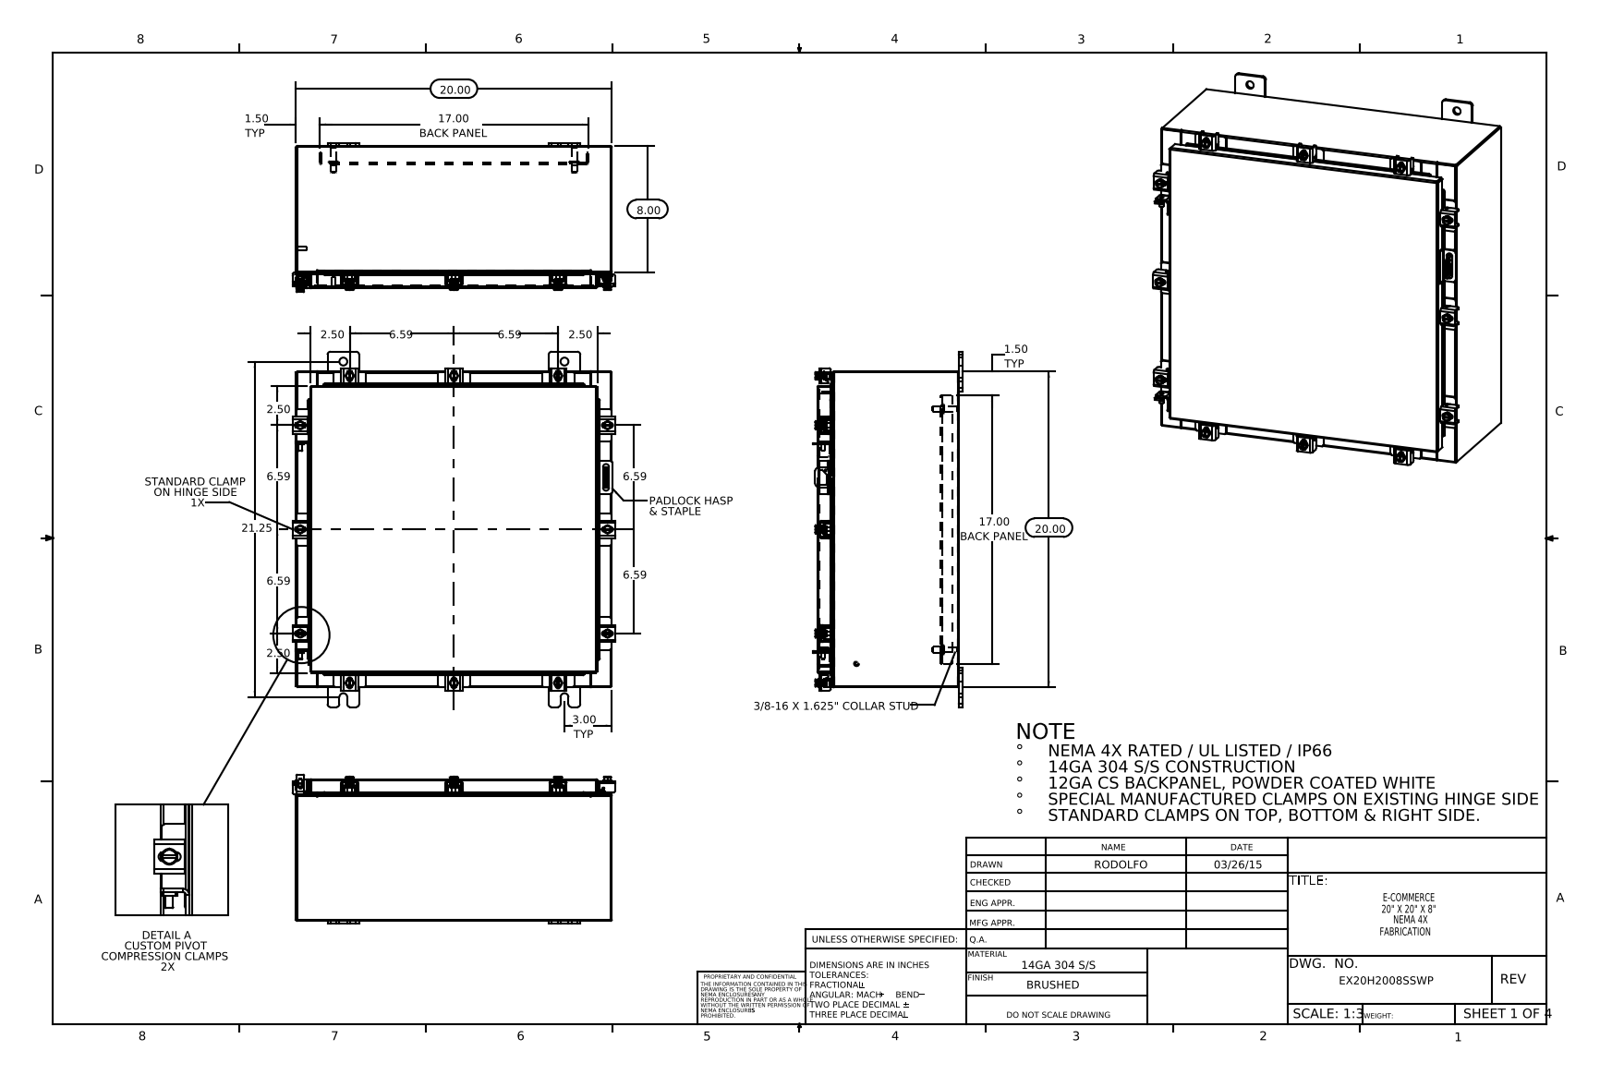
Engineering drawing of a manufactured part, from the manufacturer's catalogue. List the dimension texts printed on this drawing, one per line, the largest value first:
21.25
20.00
20.00
17.00 BACK PANEL
17.00 BACK PANEL
8.00
6.59
6.59
6.59
6.59
6.59
6.59
3.00 TYP
2.50
2.50
2.50
2.50
1.50 TYP
1.50 TYP
